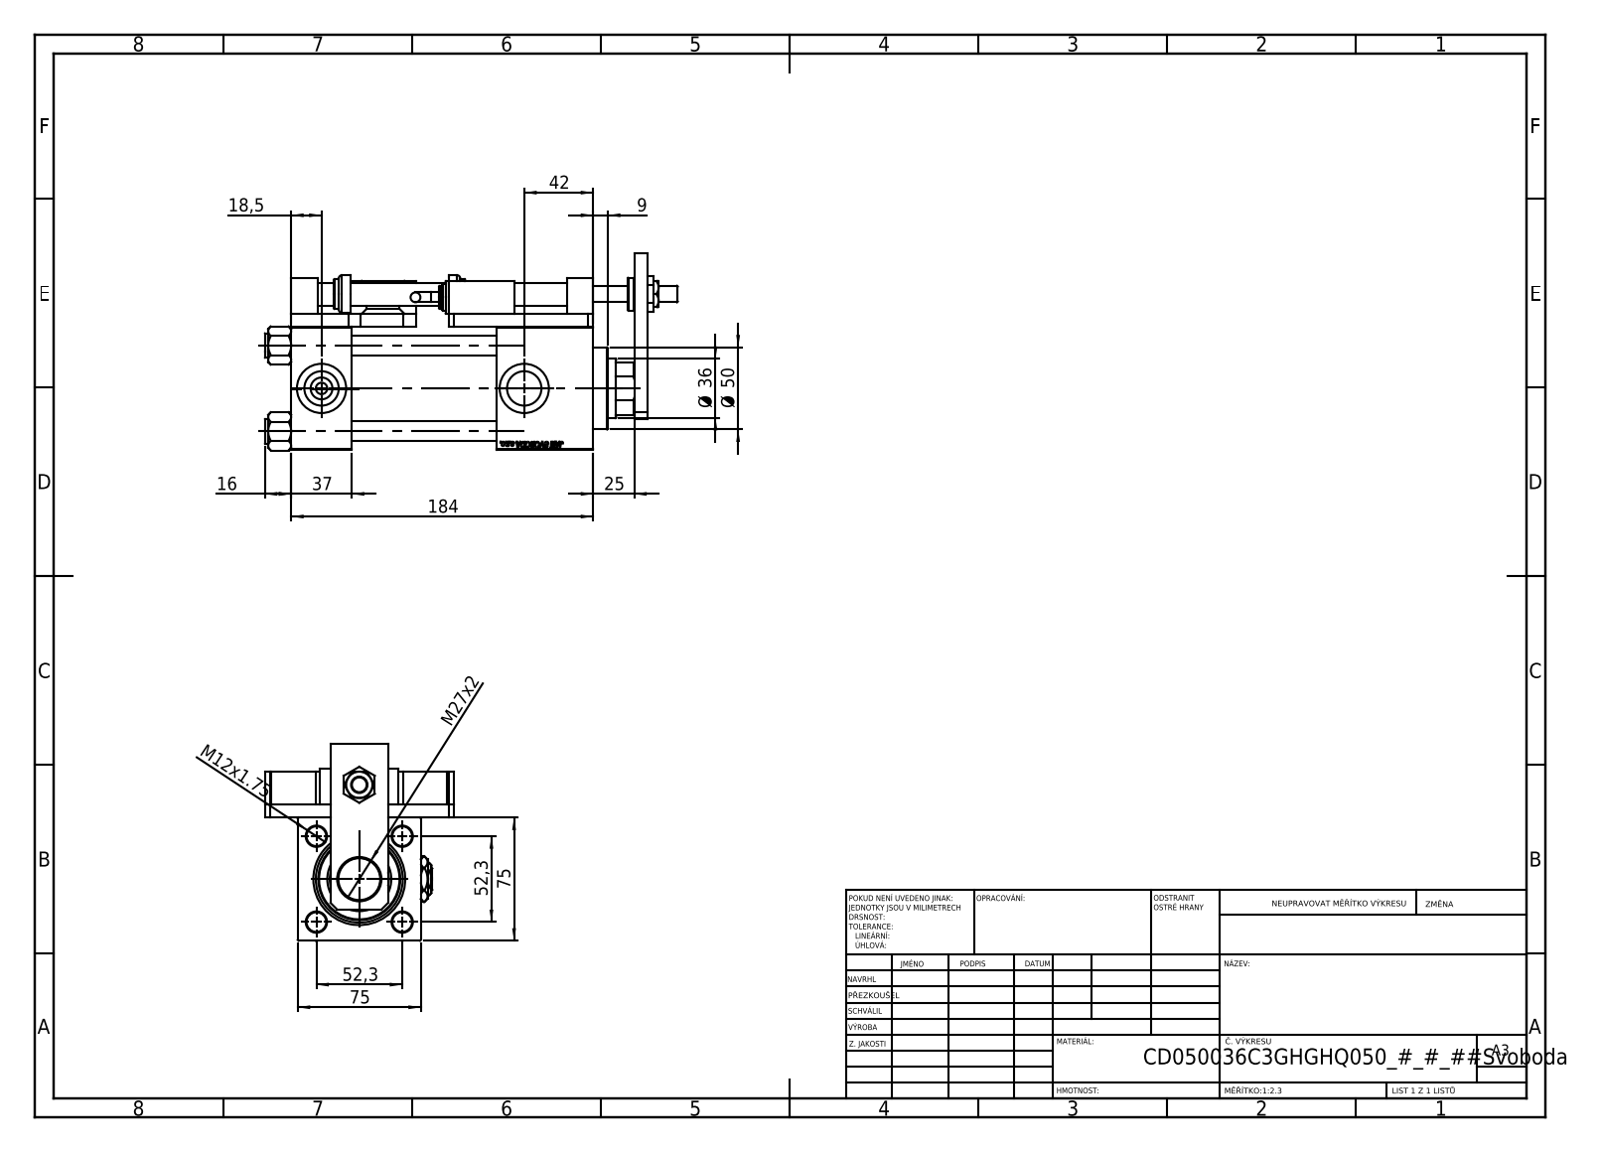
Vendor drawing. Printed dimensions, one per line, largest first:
184
75
75
52,3
52,3
Ø 50
42
37
Ø 36
M27x2
25
18,5
16
M12x1.75
9
